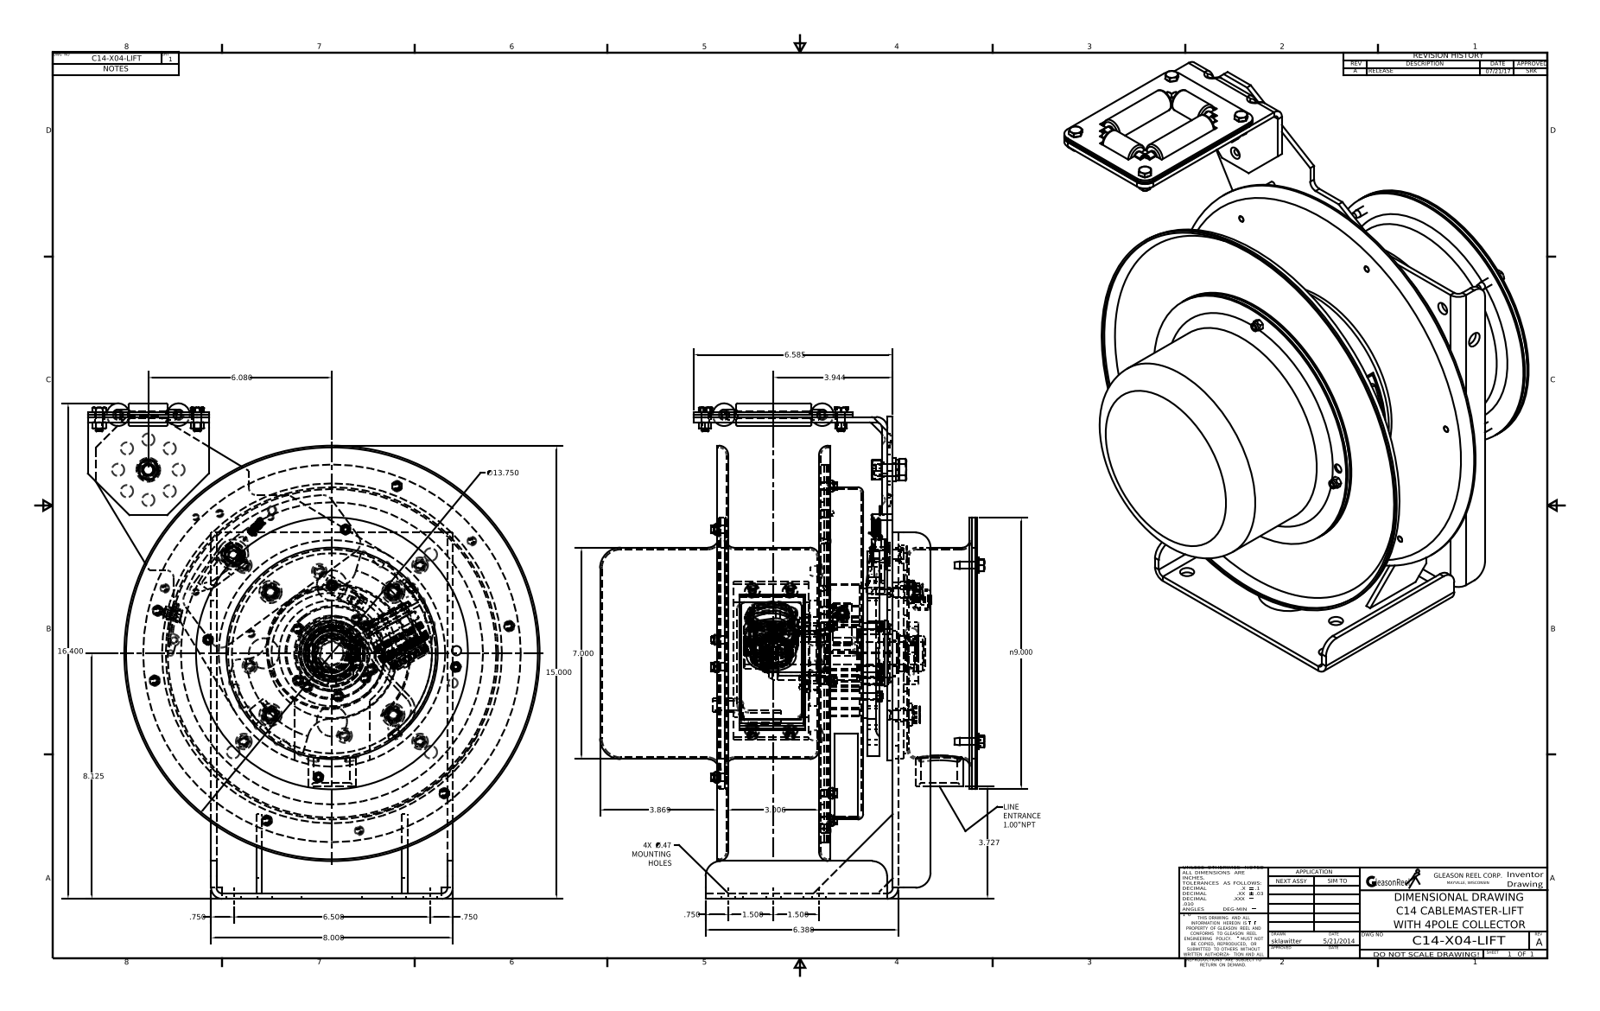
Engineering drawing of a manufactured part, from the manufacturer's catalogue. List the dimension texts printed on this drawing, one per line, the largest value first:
16.400
15.000
∅13.750
n9.000
8.125
8.000
7.000
6.585
6.500
6.380
6.080
3.944
3.869
3.727
3.006
1.500
1.500
.750
.750
.750
